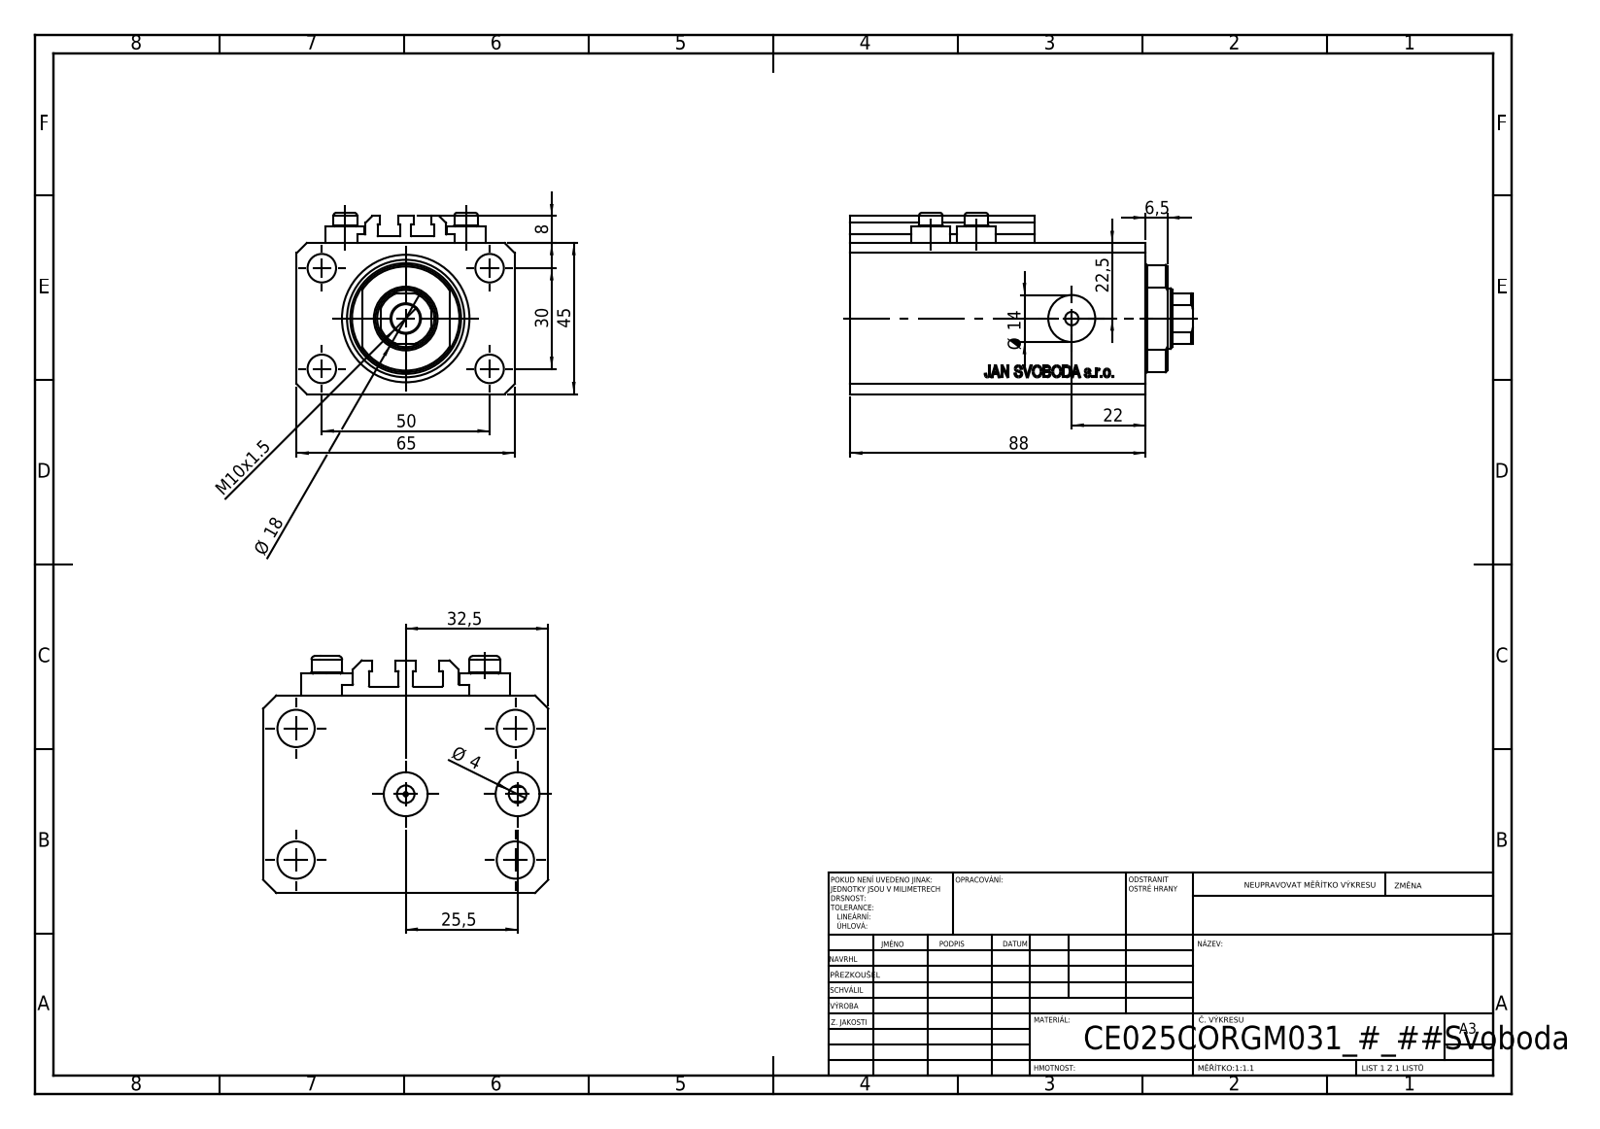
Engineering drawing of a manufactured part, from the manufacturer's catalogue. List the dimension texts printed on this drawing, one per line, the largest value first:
88
65
50
45
32,5
30
25,5
22,5
22
Ø 18
Ø 14
M10x1.5
8
6,5
Ø 4
